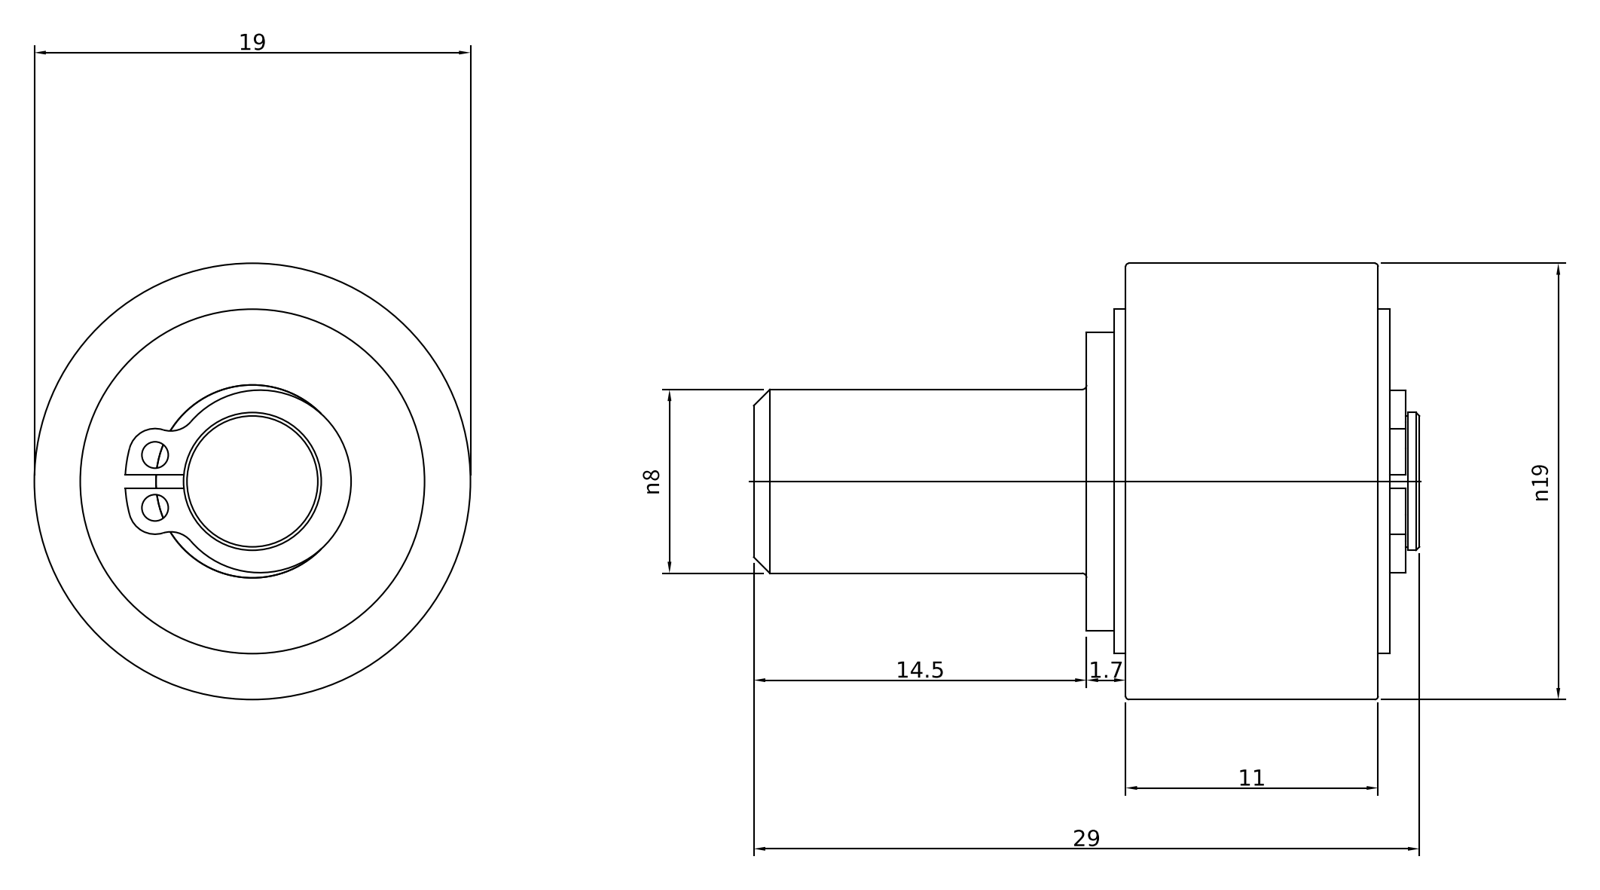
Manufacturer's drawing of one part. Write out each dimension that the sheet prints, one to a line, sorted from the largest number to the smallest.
29
19
n19
14.5
11
n8
1.7
